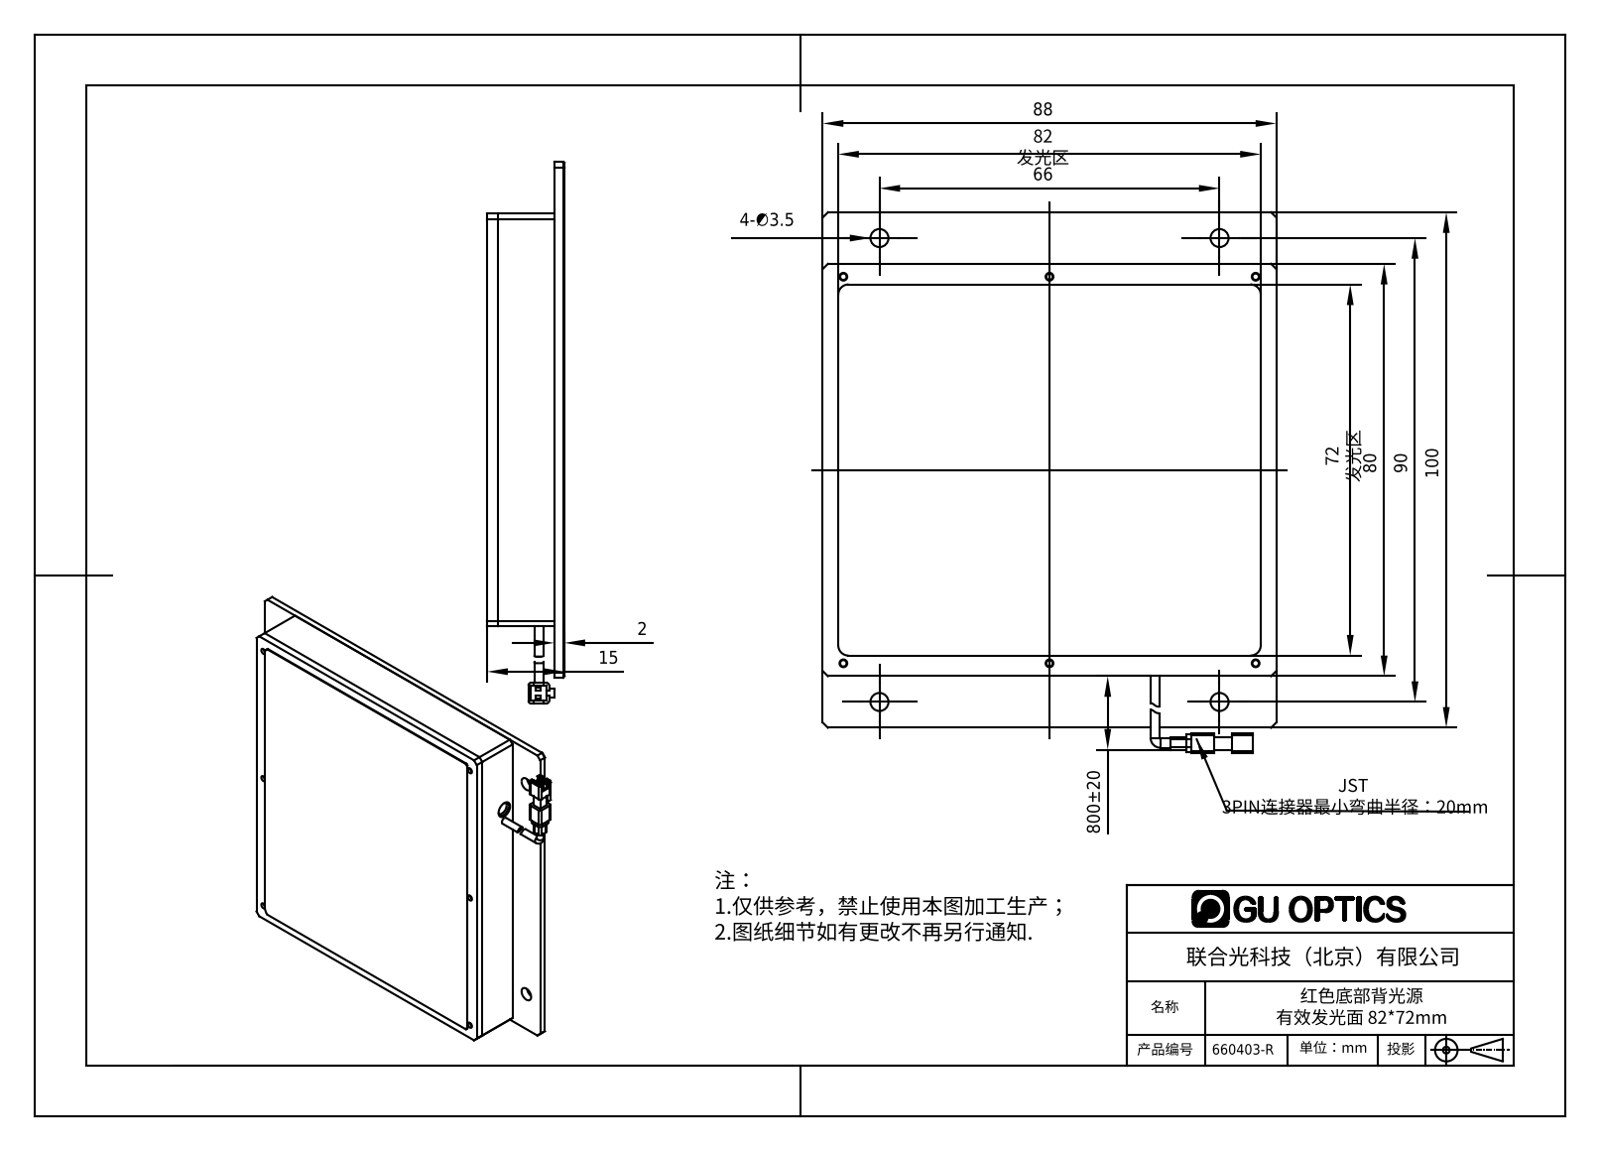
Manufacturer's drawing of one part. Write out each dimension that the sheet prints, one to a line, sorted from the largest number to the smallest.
800±20
100
90
88
82 发光区
80
72 发光区
66
15
4-∅3.5
2
